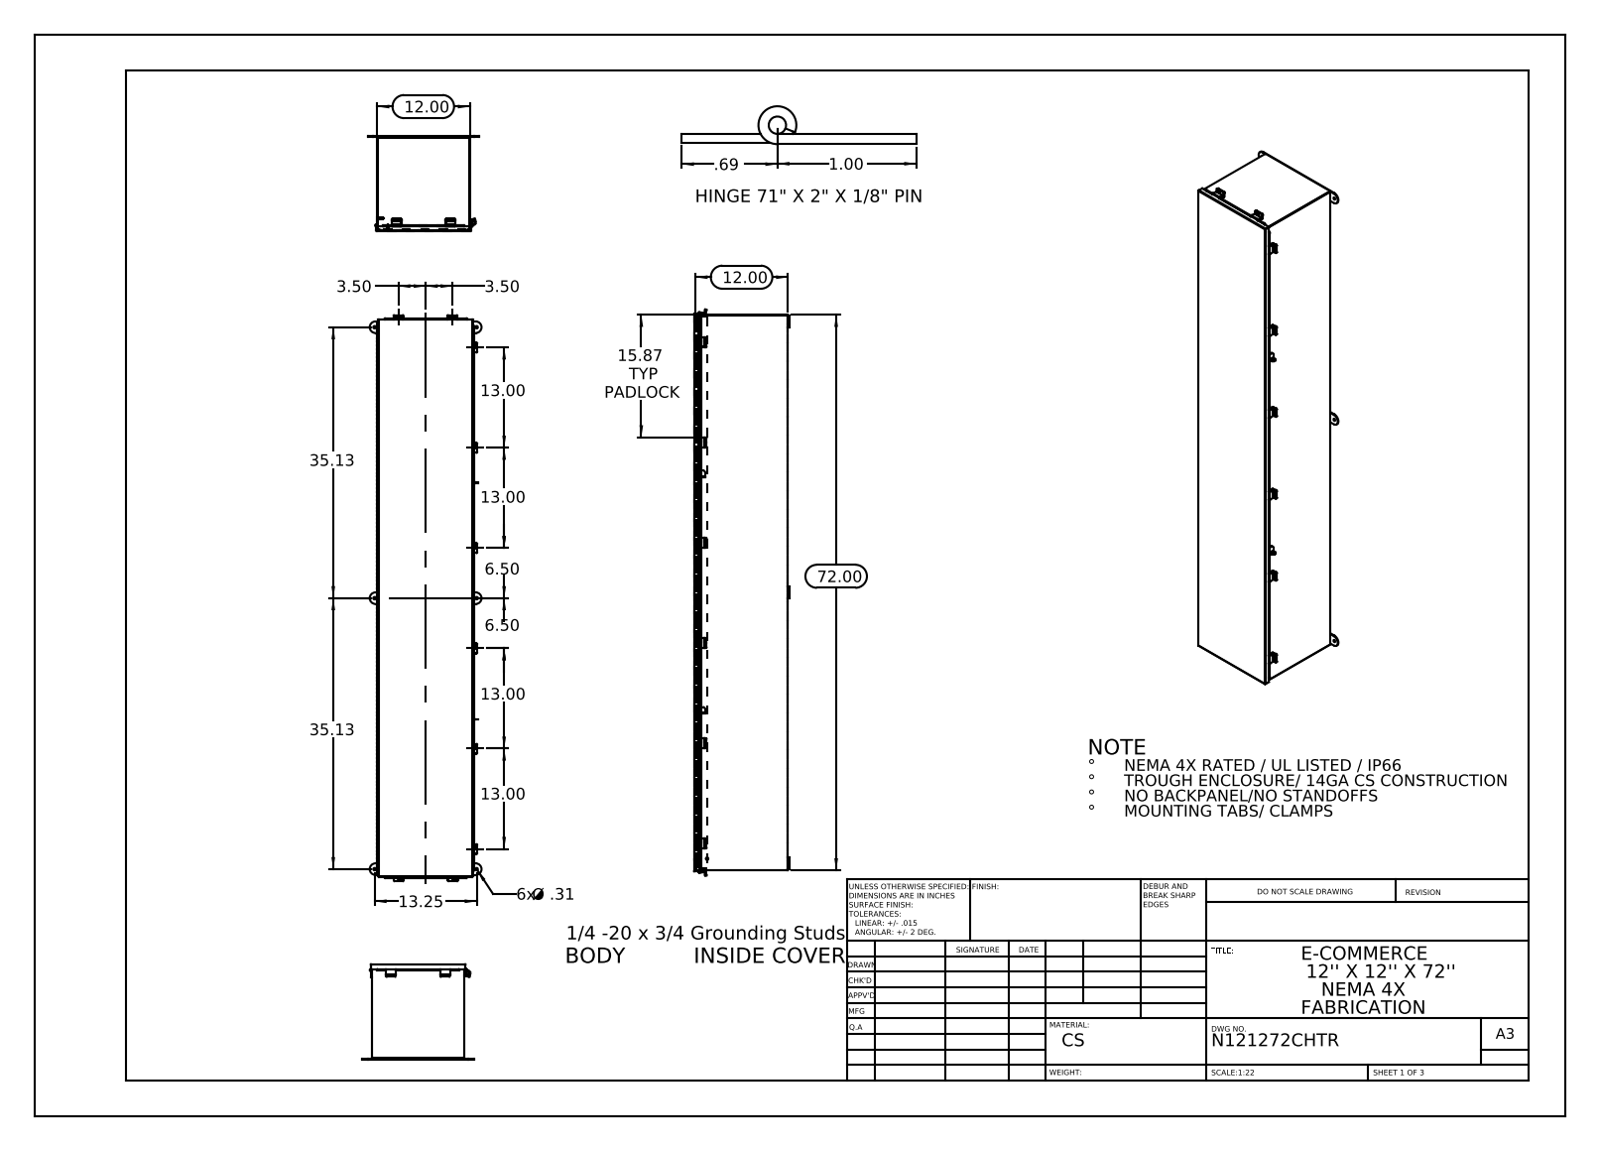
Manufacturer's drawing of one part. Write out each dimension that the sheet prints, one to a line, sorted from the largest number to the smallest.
72.00
35.13
35.13
15.87 TYP PADLOCK
13.25
13.00
13.00
13.00
13.00
12.00
12.00
6.50
6.50
3.50
3.50
1.00
.69
6x Ø .31
